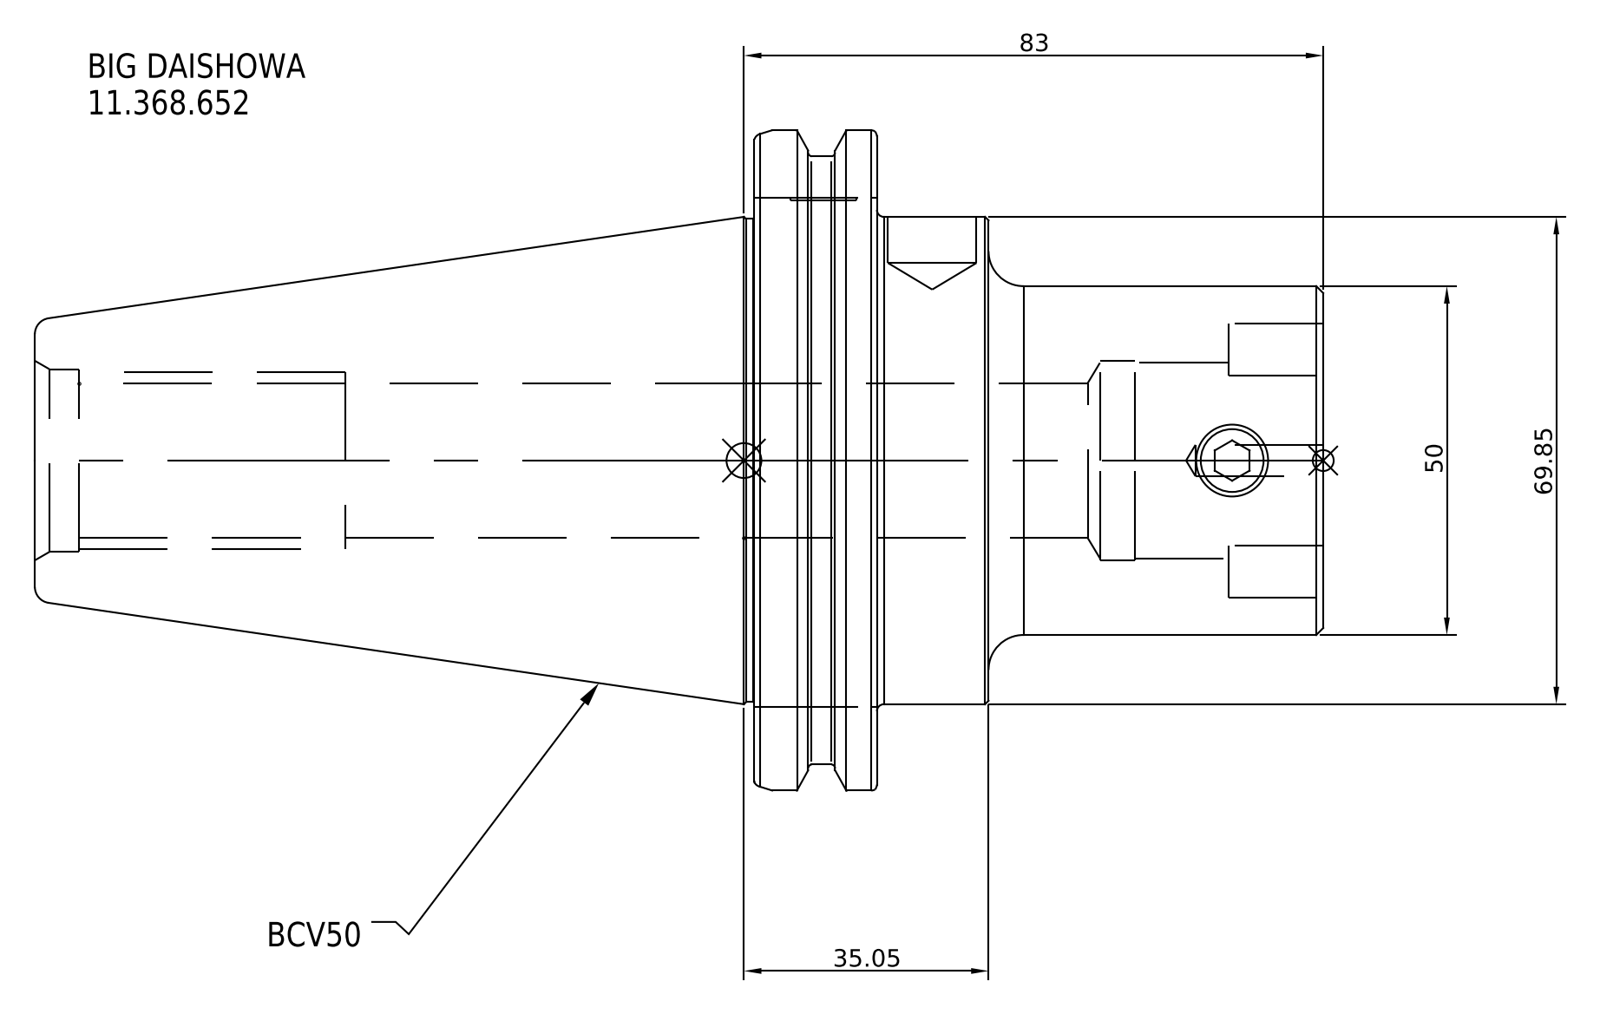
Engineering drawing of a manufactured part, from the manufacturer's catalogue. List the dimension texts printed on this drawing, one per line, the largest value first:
83
69.85
50
35.05
